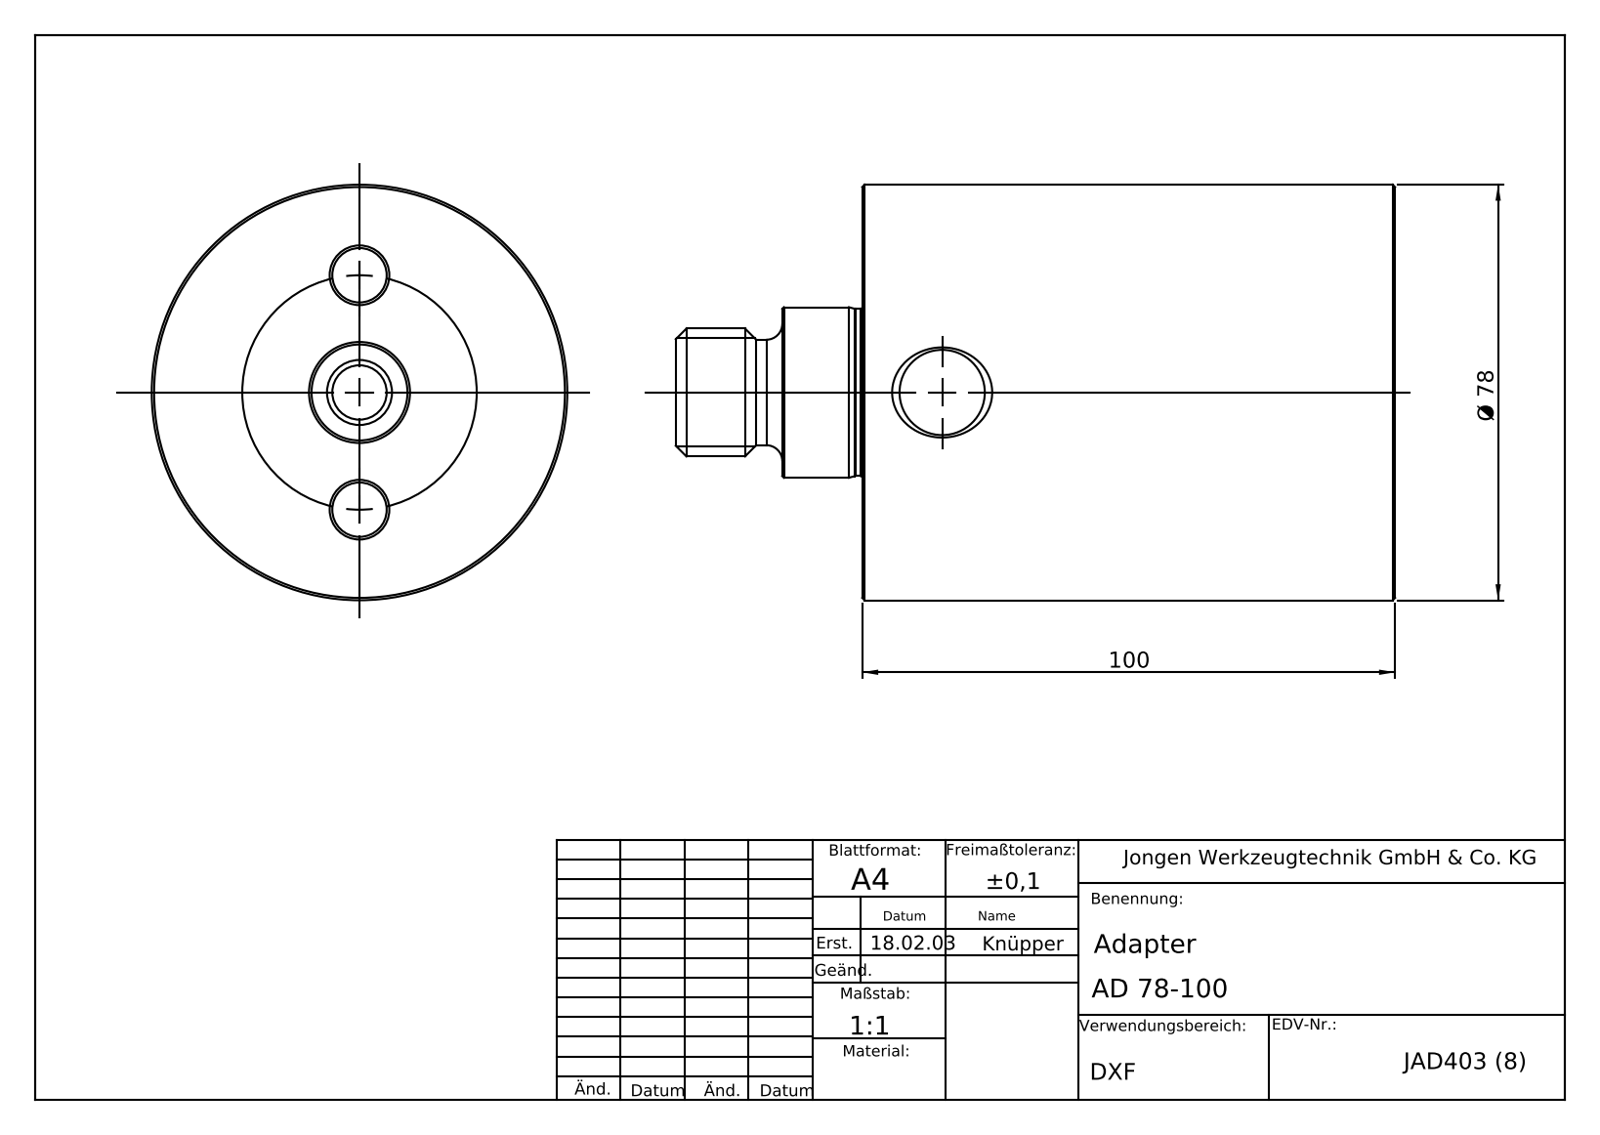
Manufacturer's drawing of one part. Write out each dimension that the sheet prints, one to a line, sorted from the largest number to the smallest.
100
Ø 78
